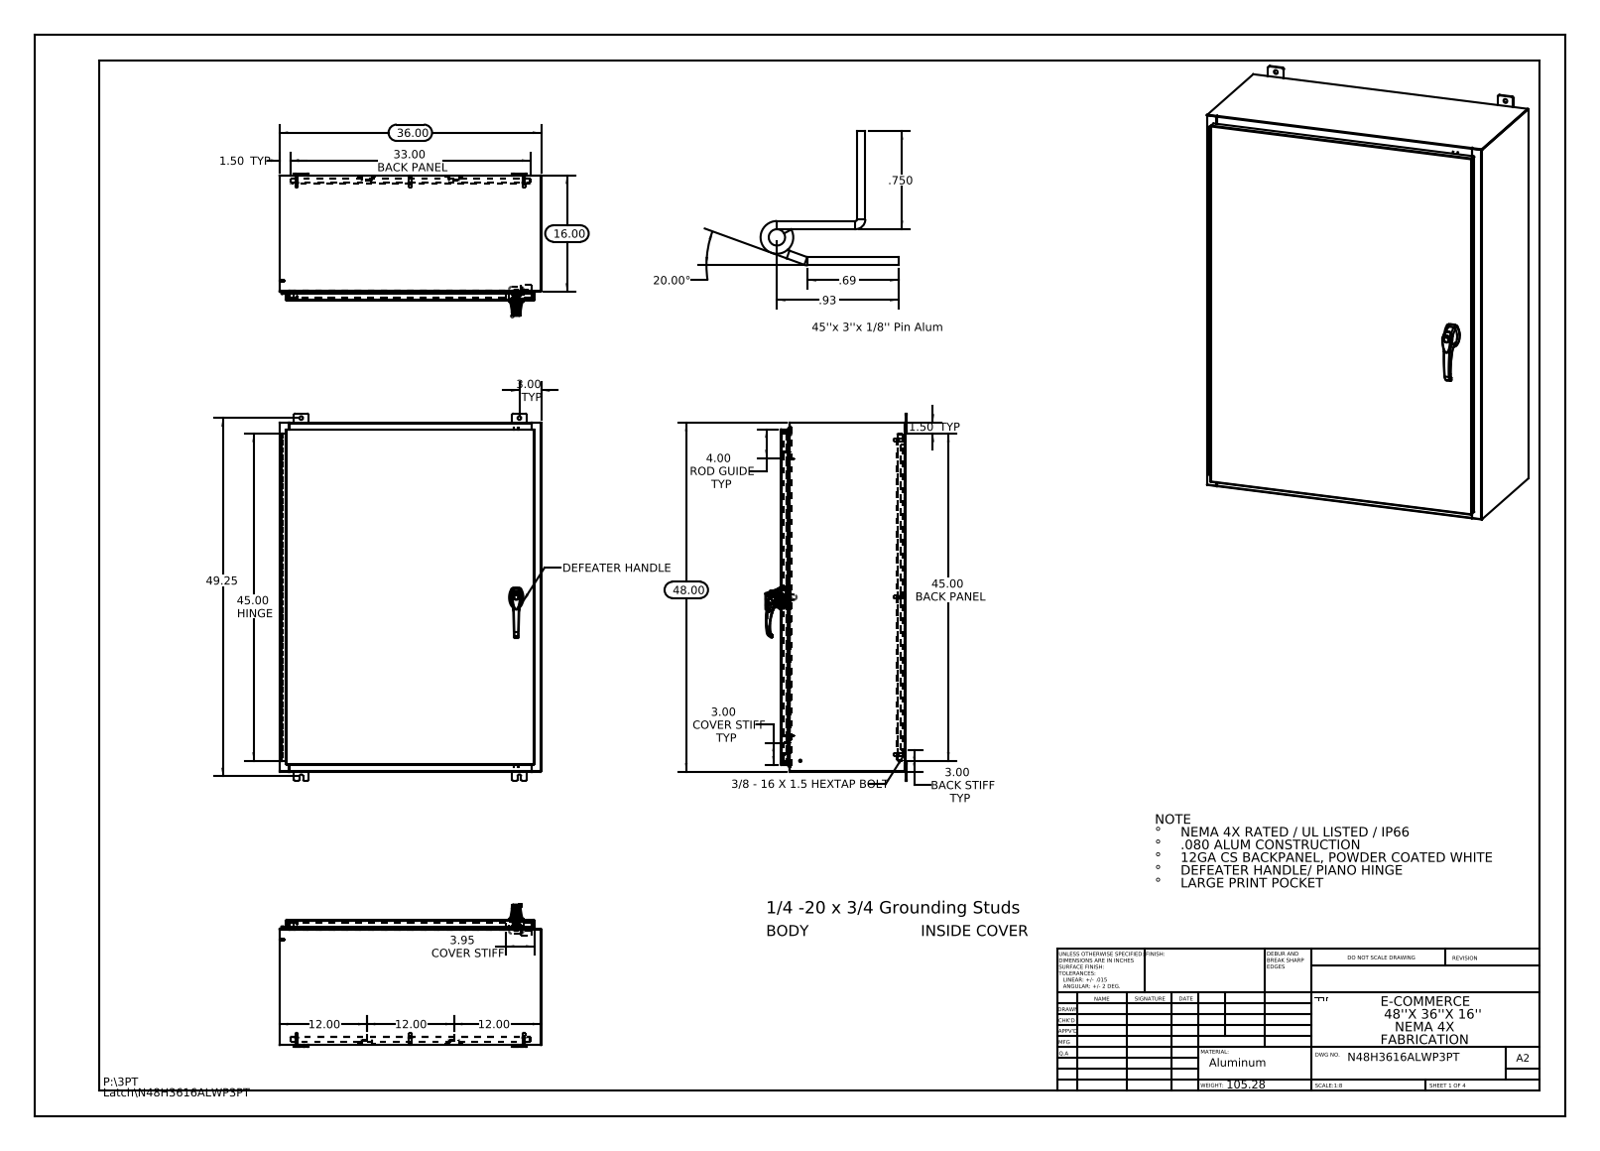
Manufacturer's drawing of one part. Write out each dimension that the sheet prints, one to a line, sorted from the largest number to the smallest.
49.25
48.00
45.00 HINGE
45.00 BACK PANEL
36.00
33.00 BACK PANEL
20.00°
16.00
12.00
12.00
12.00
4.00 ROD GUIDE TYP
3.95 COVER STIFF
3.00 TYP
3.00 COVER STIFF TYP
3.00 BACK STIFF TYP
1.50 TYP
1.50 TYP
.93
.750
.69
